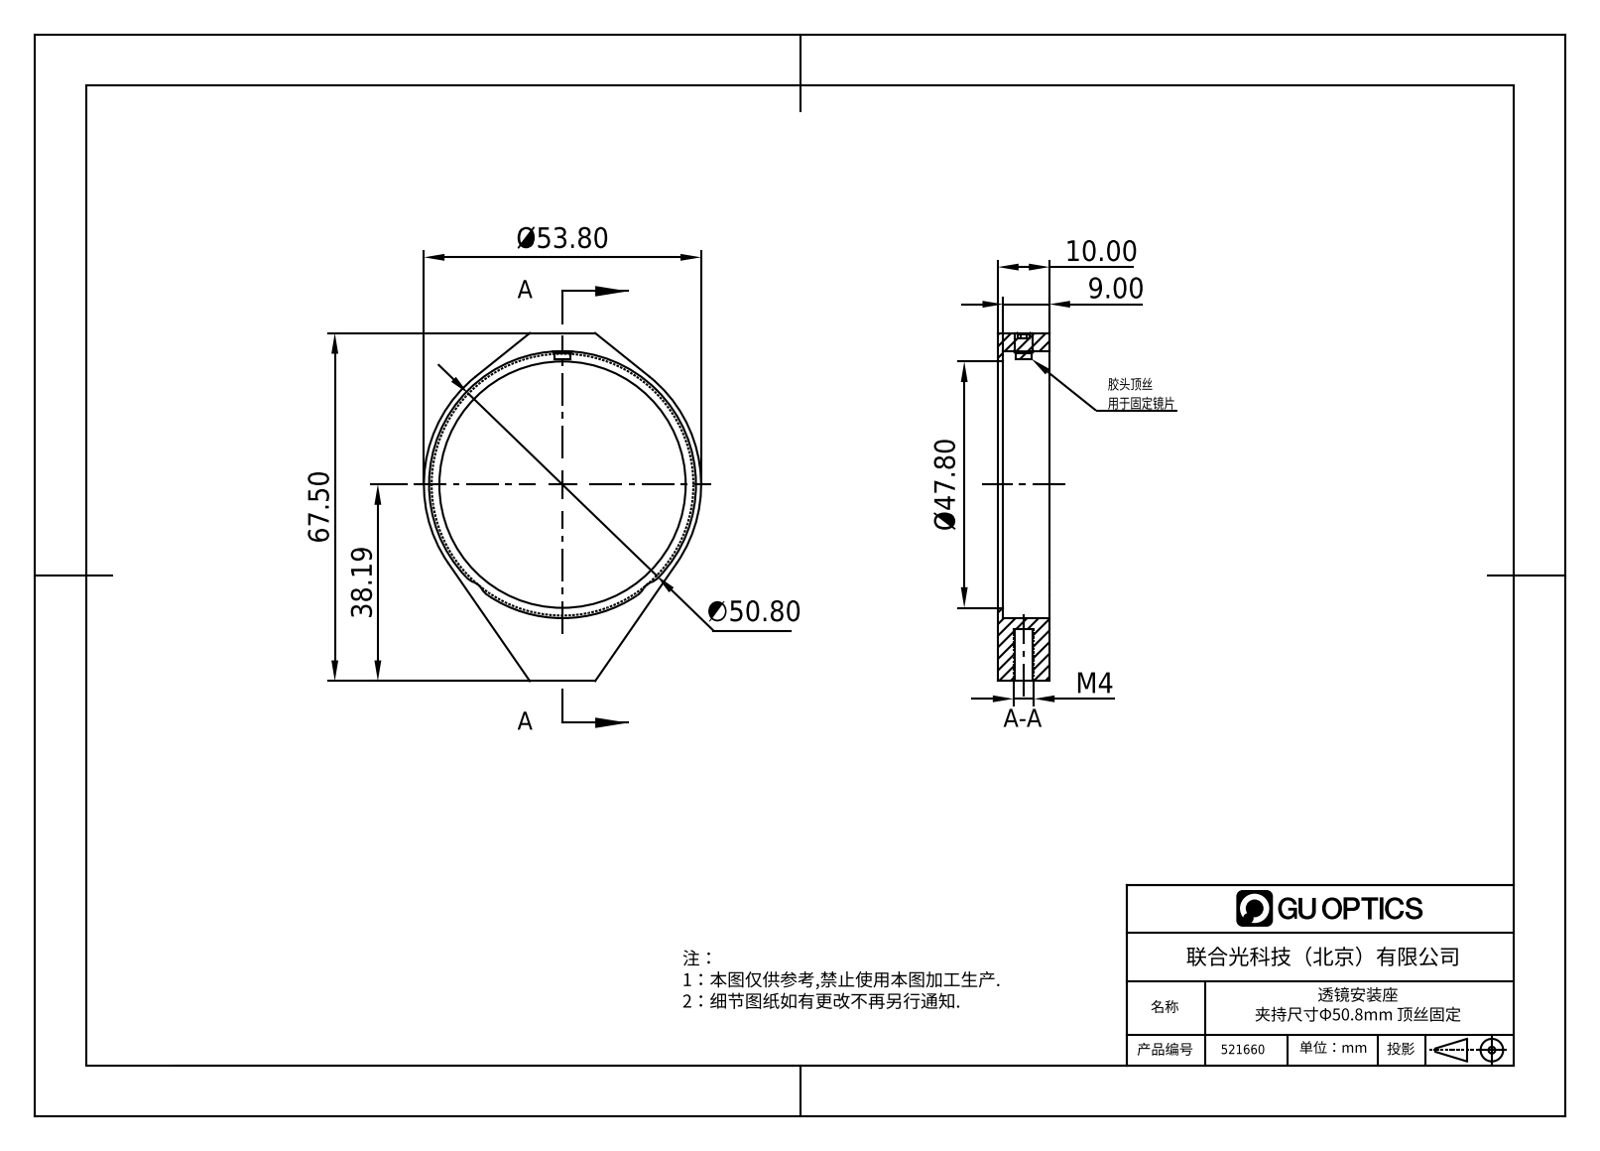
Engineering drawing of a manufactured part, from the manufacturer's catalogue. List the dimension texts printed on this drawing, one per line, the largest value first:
67.50
Ø53.80
∅50.80
Ø47.80
38.19
10.00
9.00
M4
